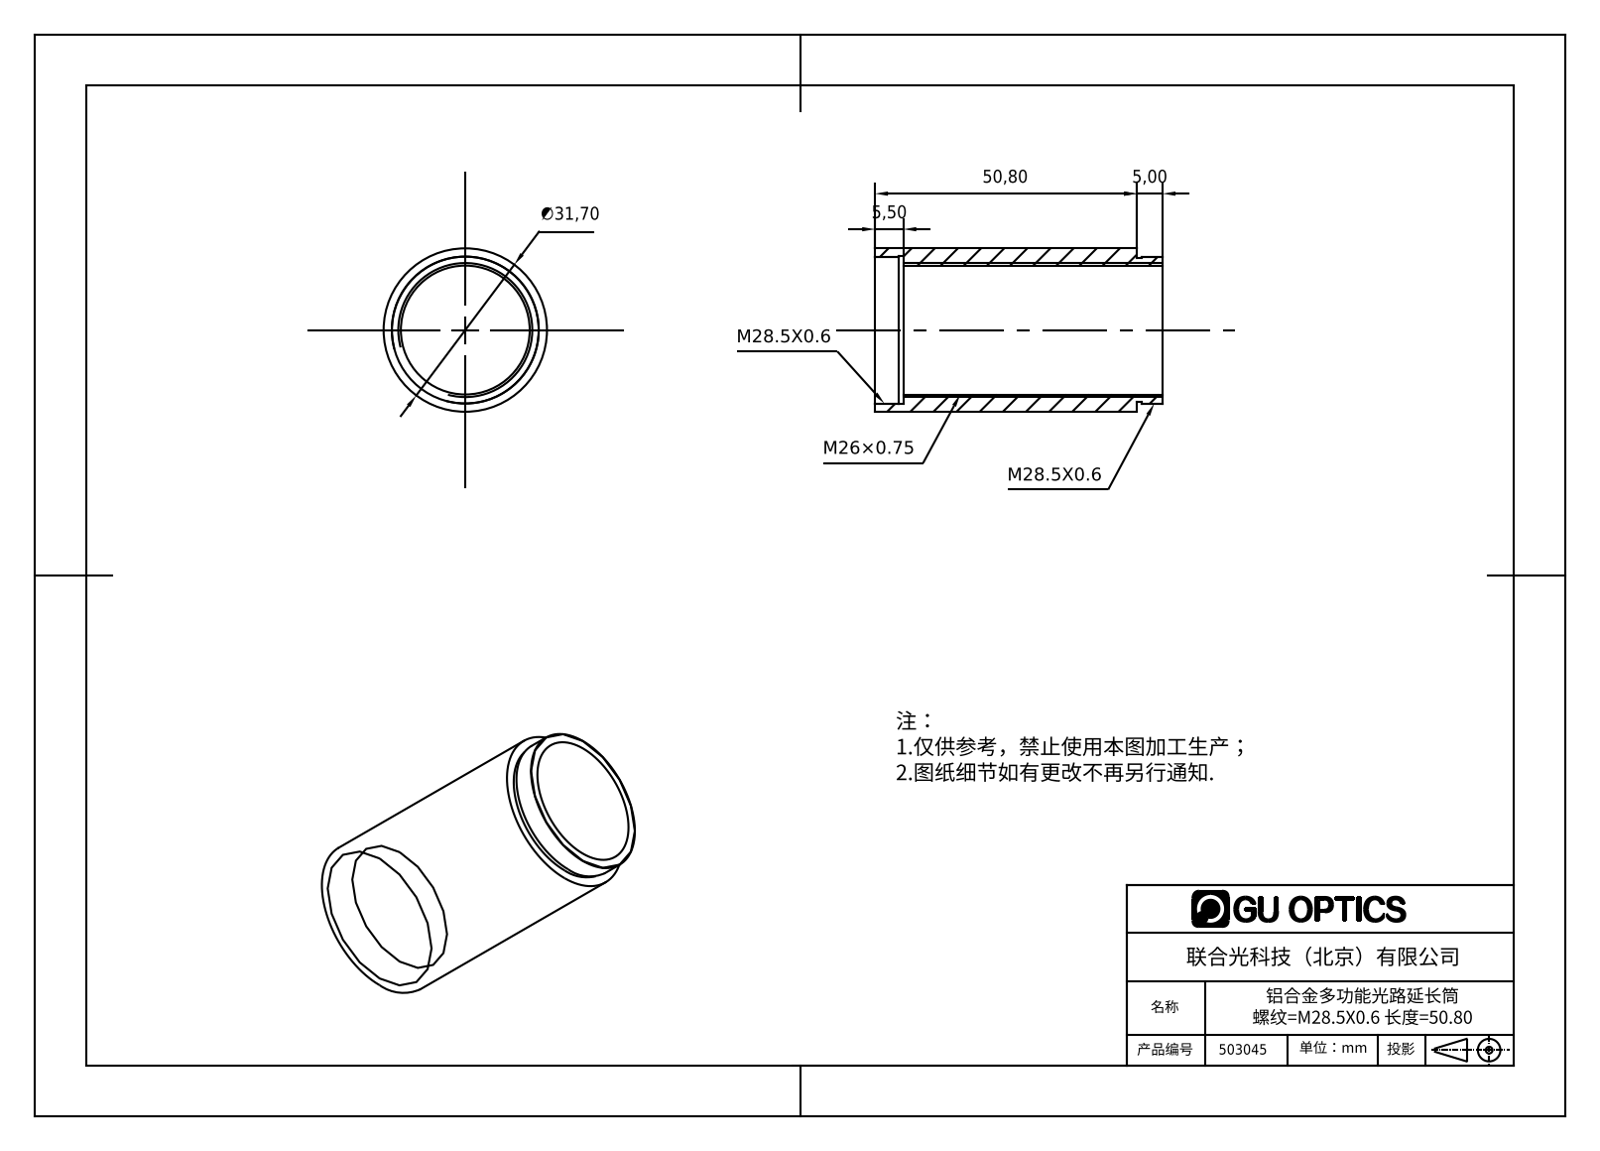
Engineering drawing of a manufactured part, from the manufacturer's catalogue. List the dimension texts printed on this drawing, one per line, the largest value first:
50,80
∅31,70
5,50
5,00
